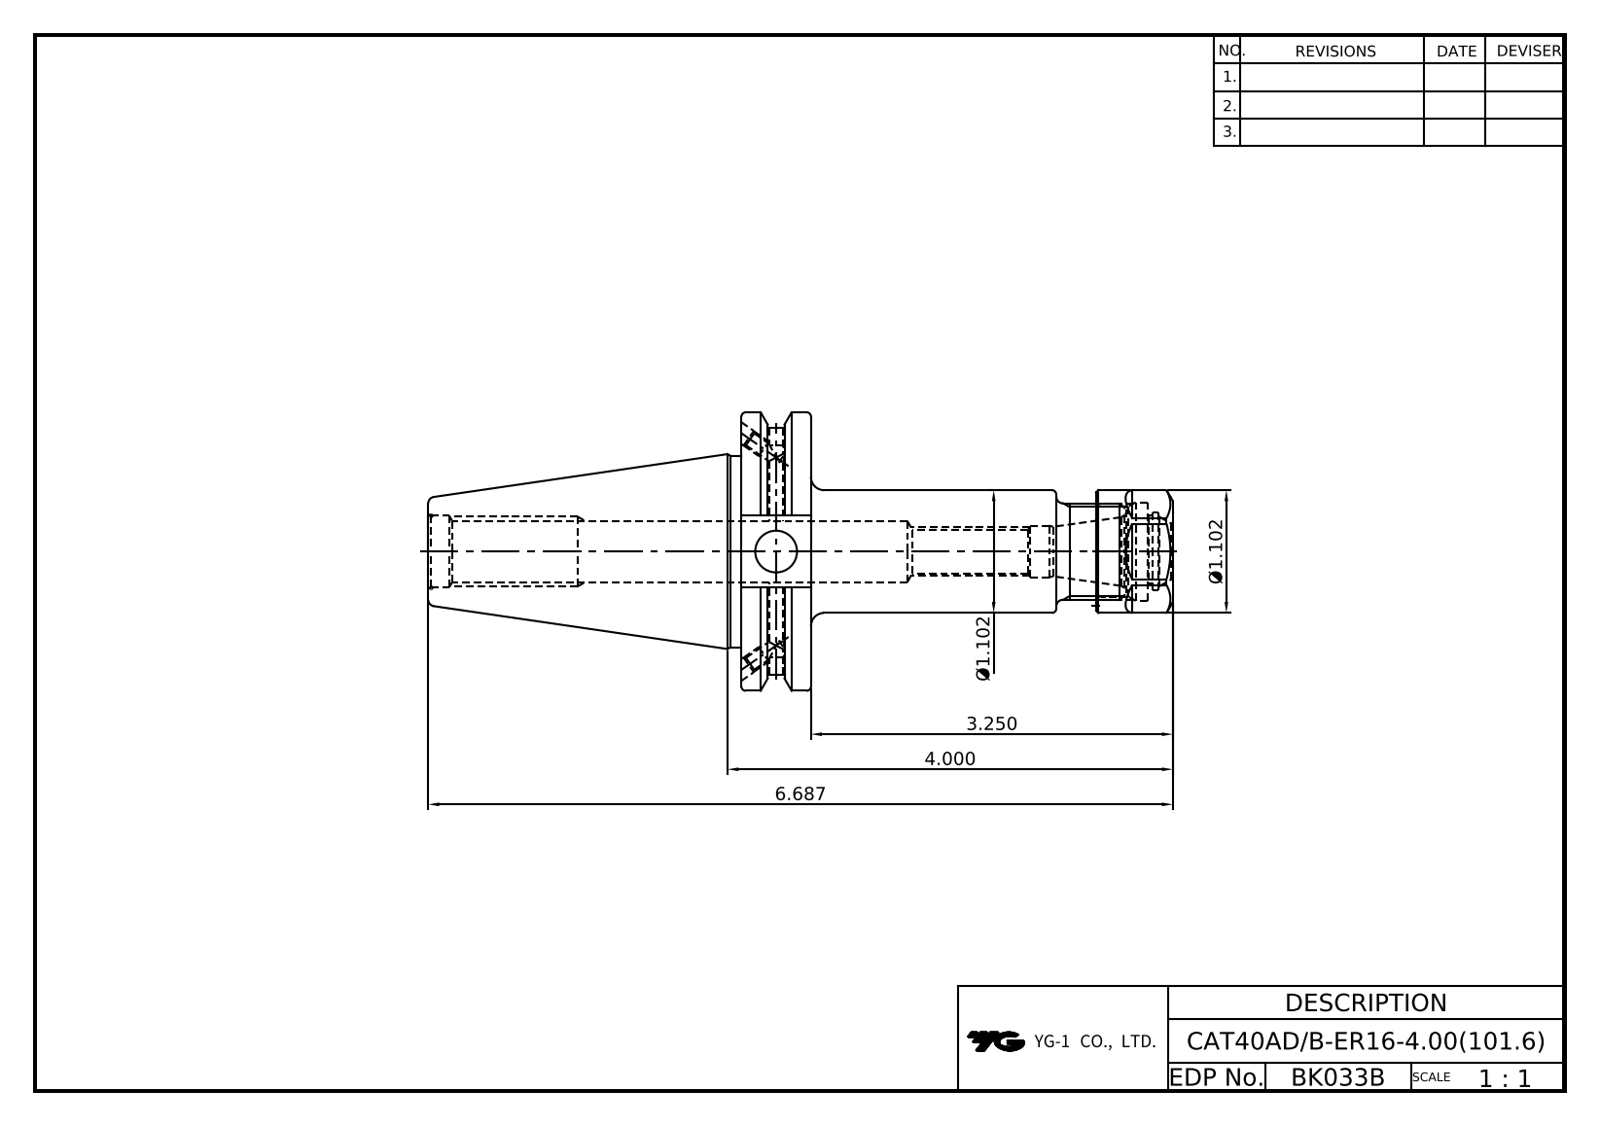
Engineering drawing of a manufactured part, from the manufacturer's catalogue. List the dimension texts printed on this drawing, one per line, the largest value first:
6.687
4.000
3.250
Ø1.102
Ø1.102
